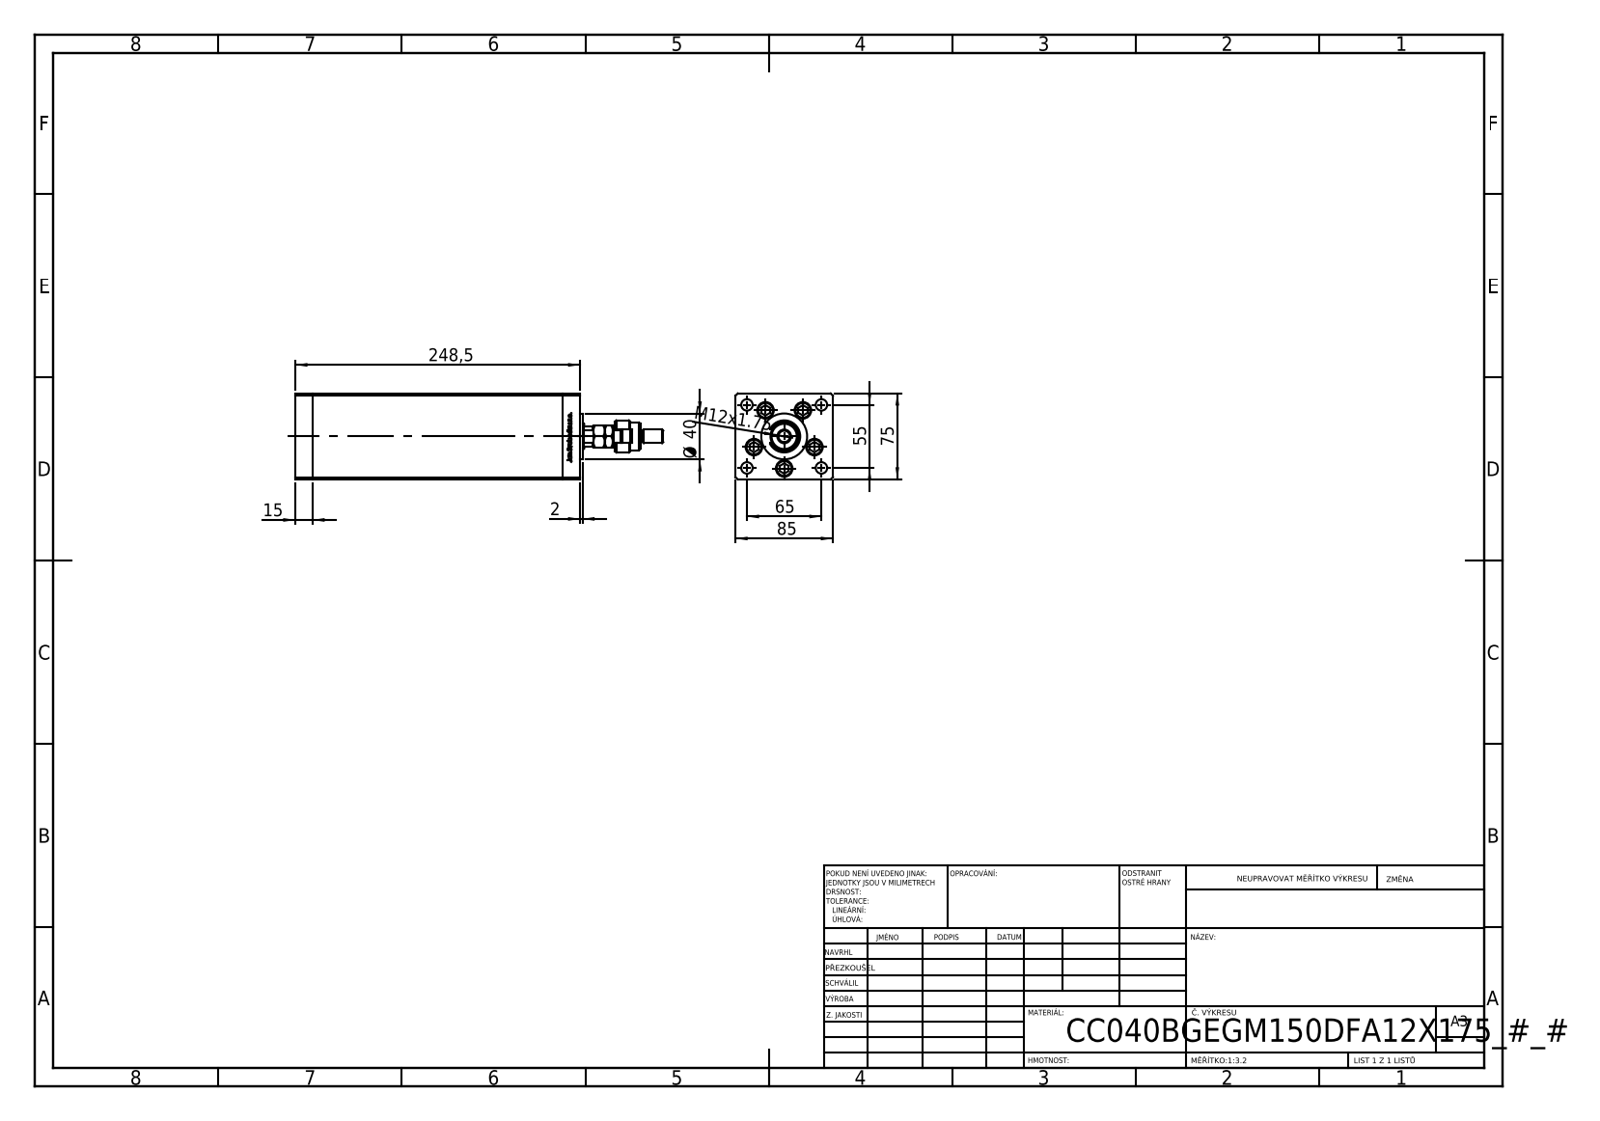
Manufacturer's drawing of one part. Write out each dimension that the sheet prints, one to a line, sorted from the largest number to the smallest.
248,5
85
75
65
55
Ø 40
15
M12x1.75
2
